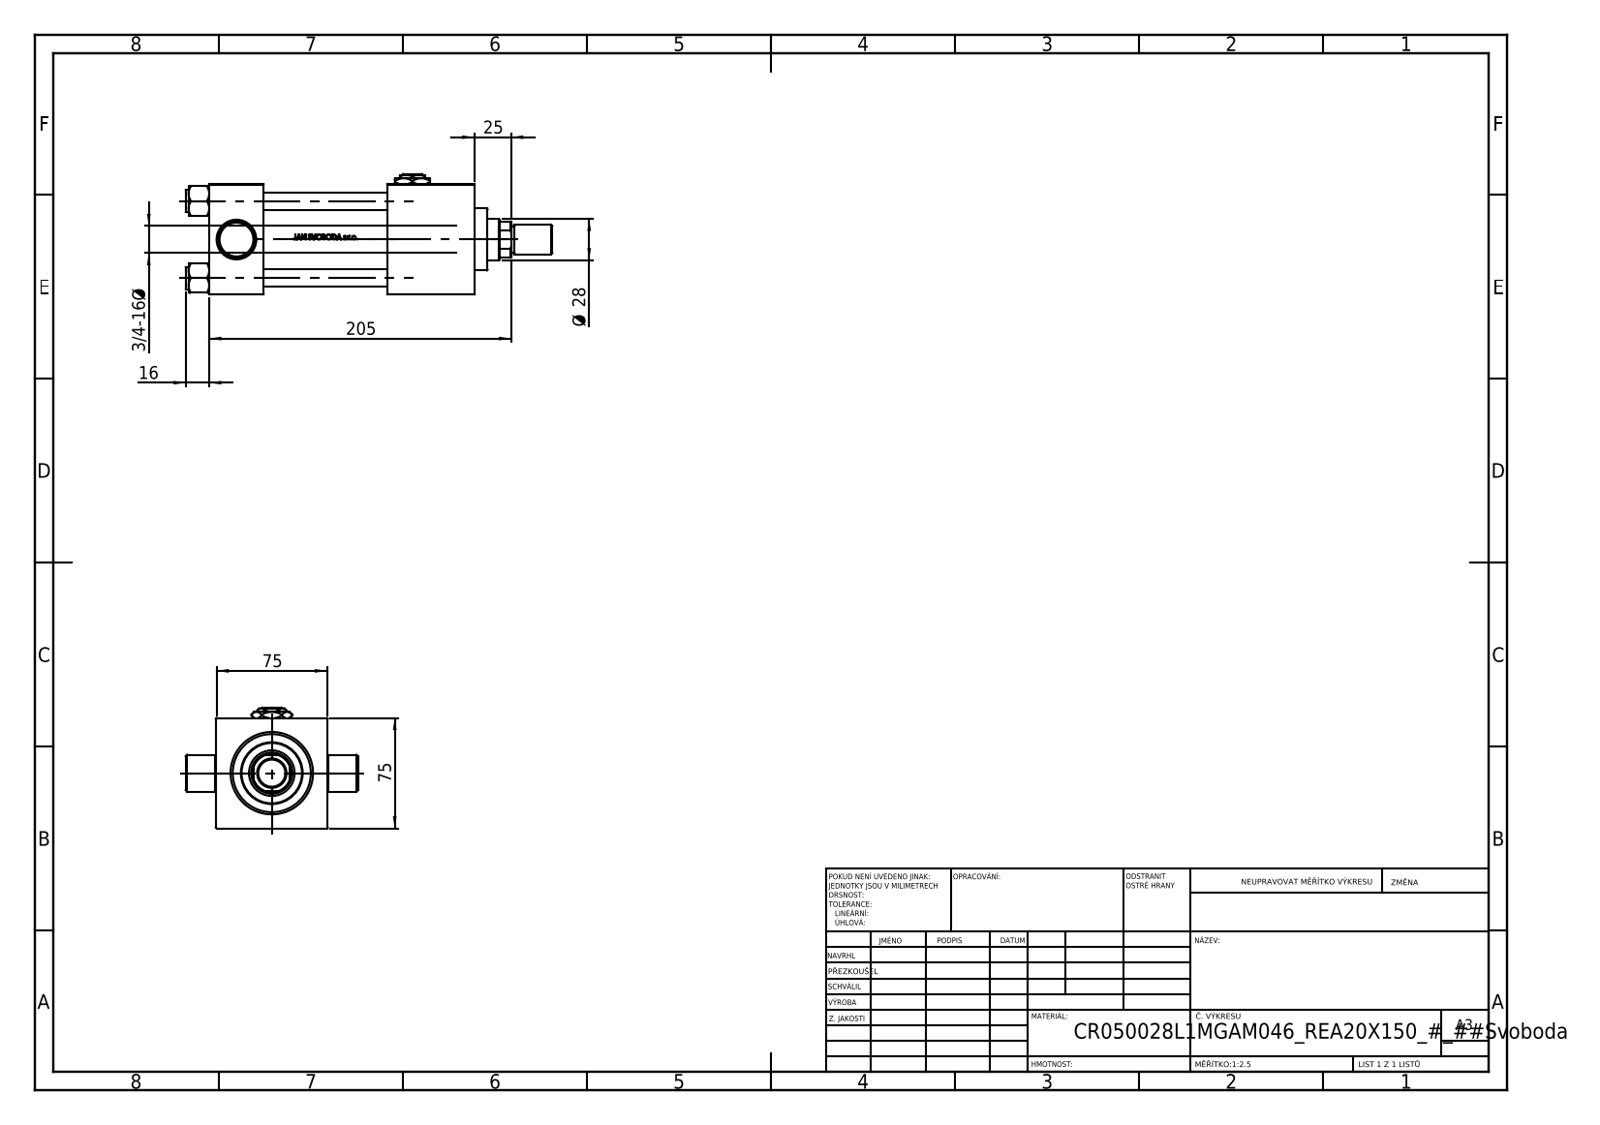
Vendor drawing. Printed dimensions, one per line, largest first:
205
75
75
Ø 28
25
16
3/4-16 Ø
